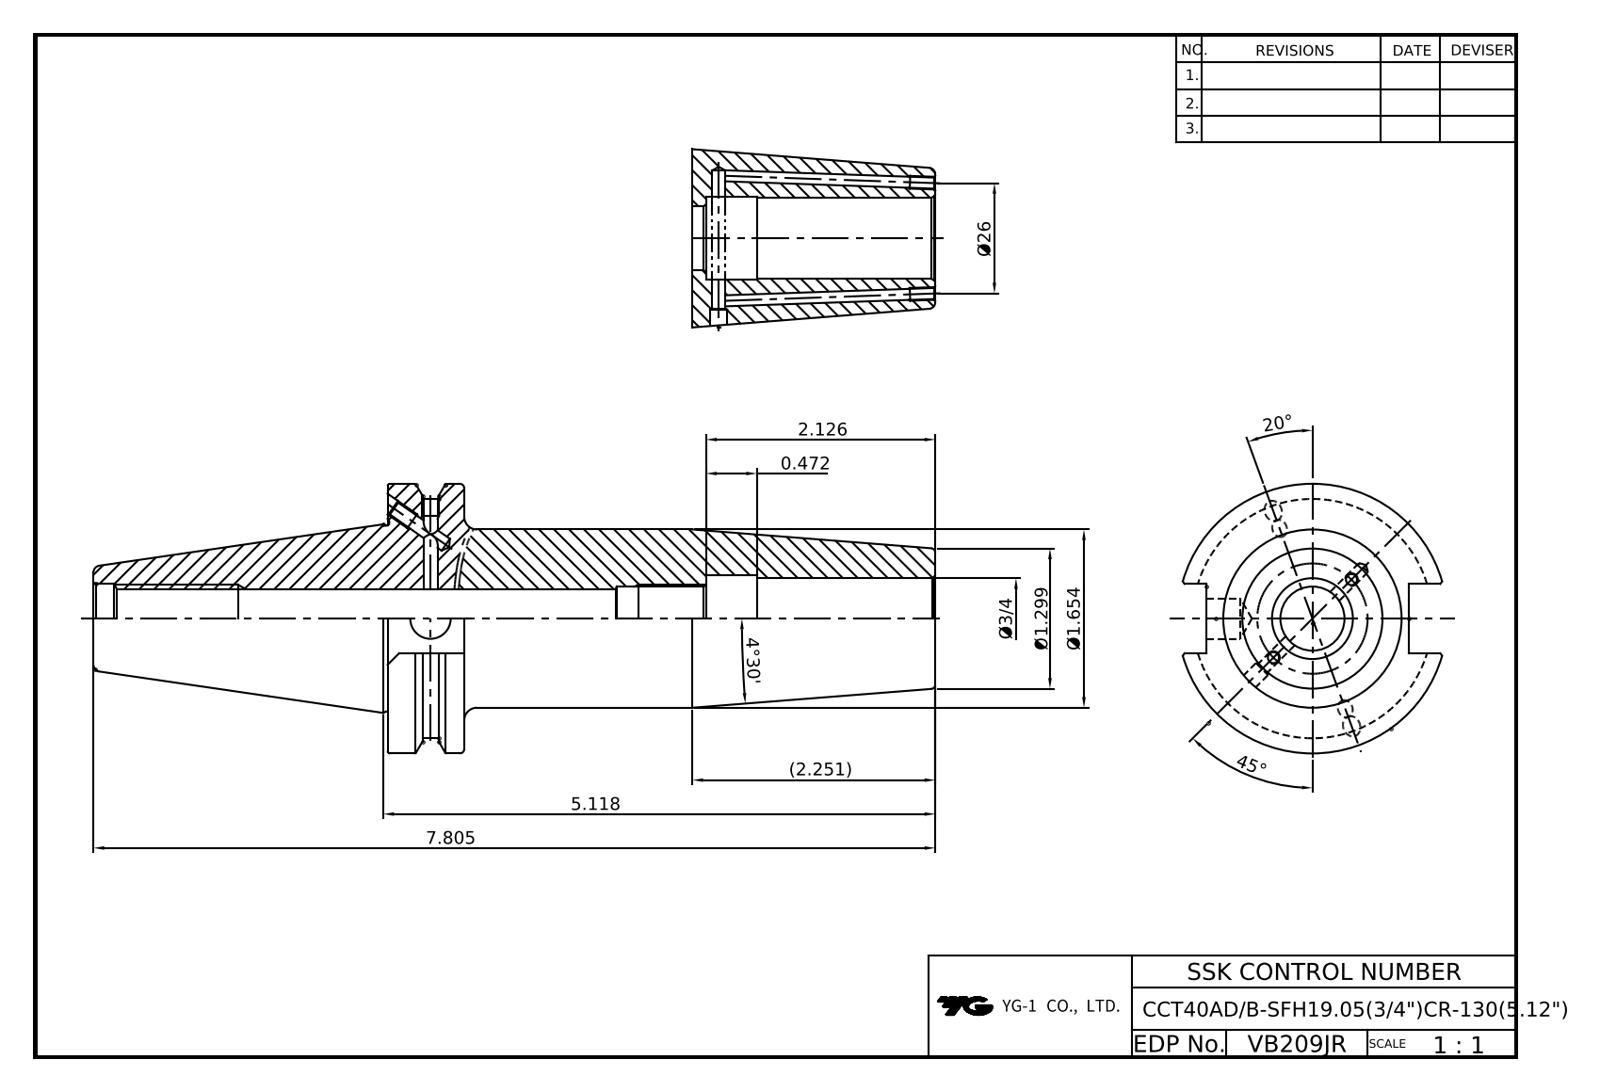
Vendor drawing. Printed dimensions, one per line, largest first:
45°
Ø26
20°
7.805
5.118
4°30'
(2.251)
2.126
Ø1.654
Ø1.299
Ø3/4
0.472
